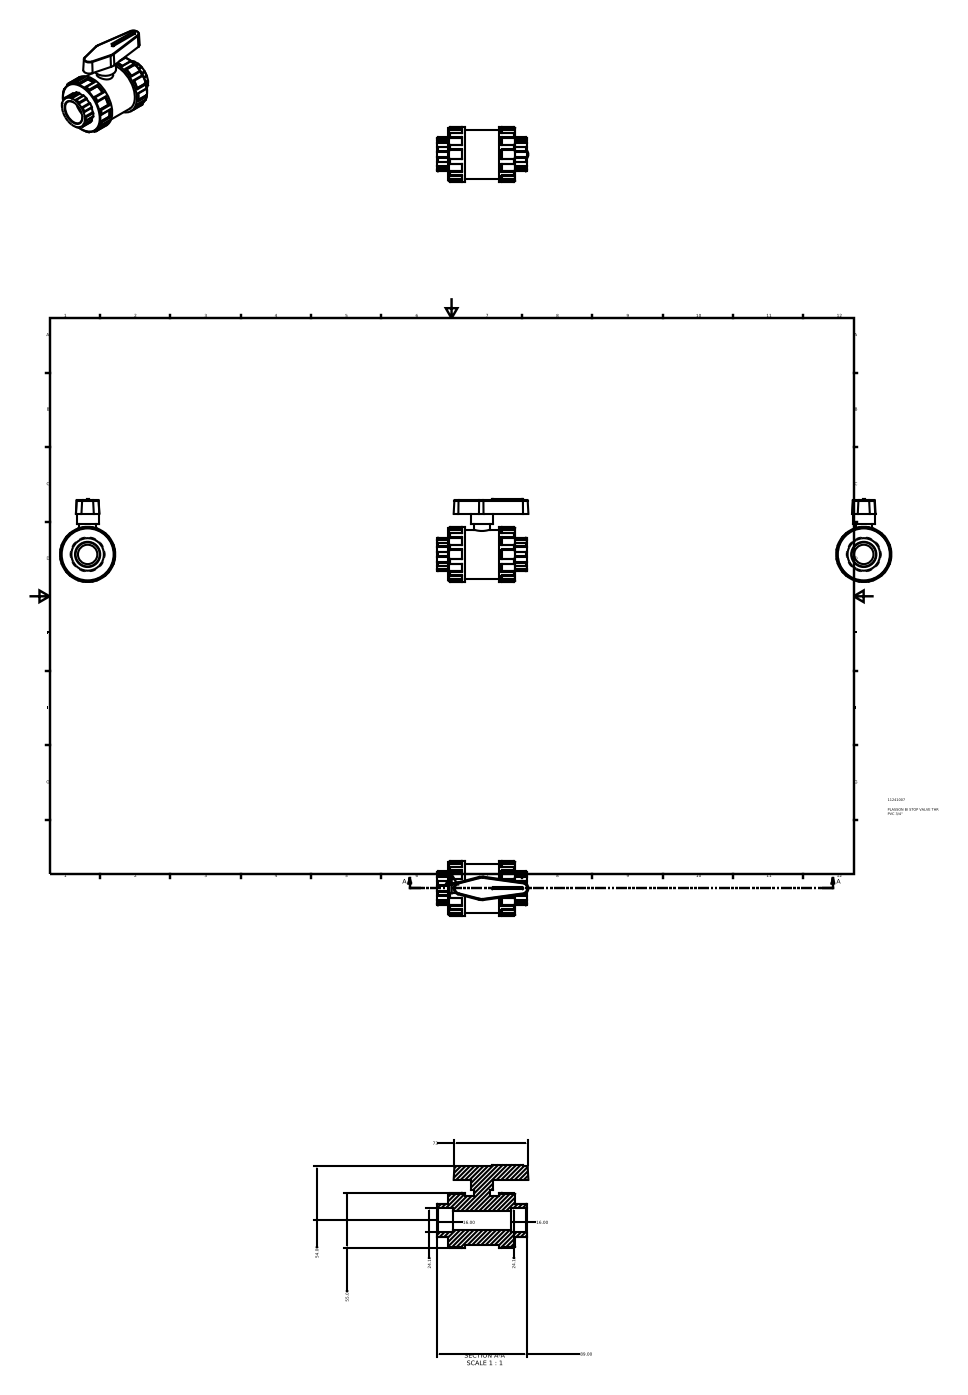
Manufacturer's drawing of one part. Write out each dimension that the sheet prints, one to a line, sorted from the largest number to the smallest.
89.00
73
55.00
54.00
24.12
24.12
16.00
16.00
